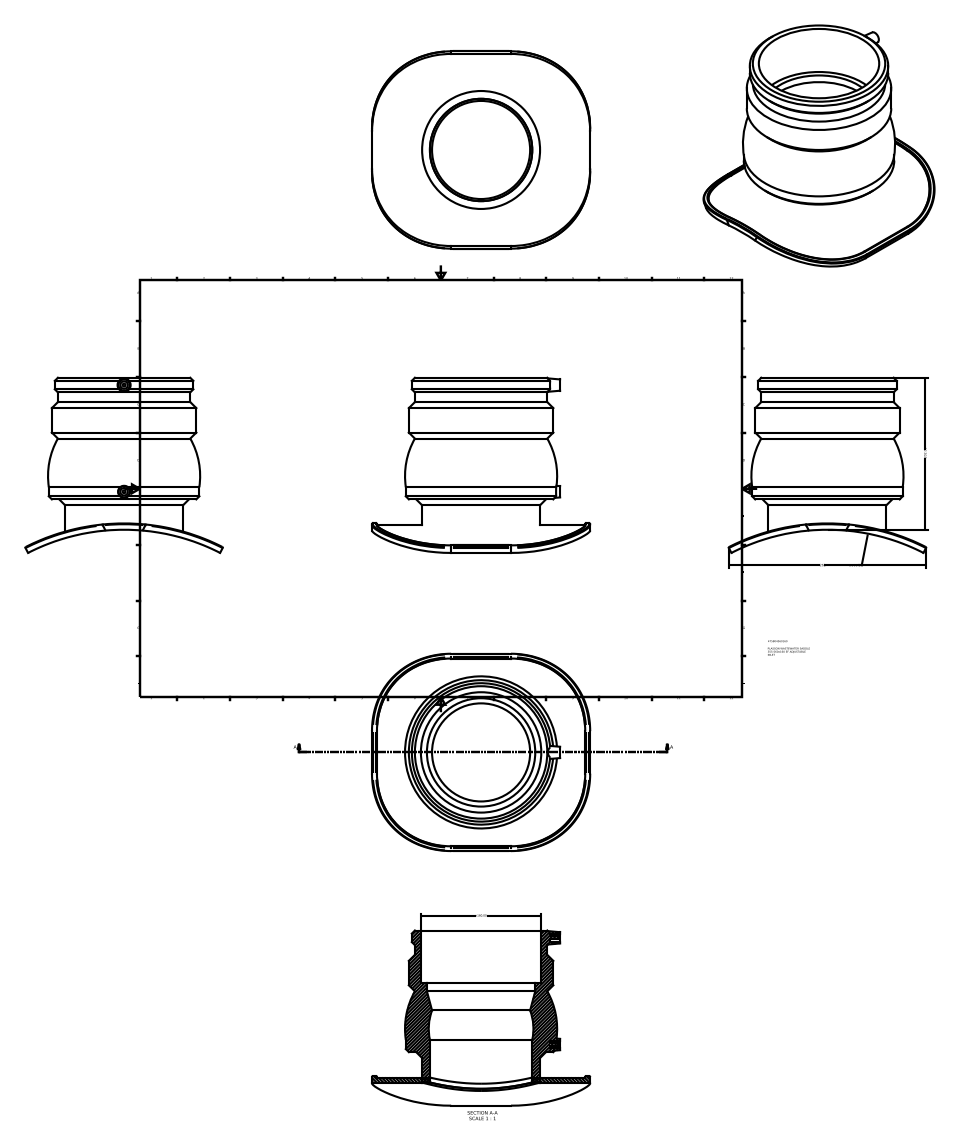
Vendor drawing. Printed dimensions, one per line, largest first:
∅560.0
262
202.00
n160.00
